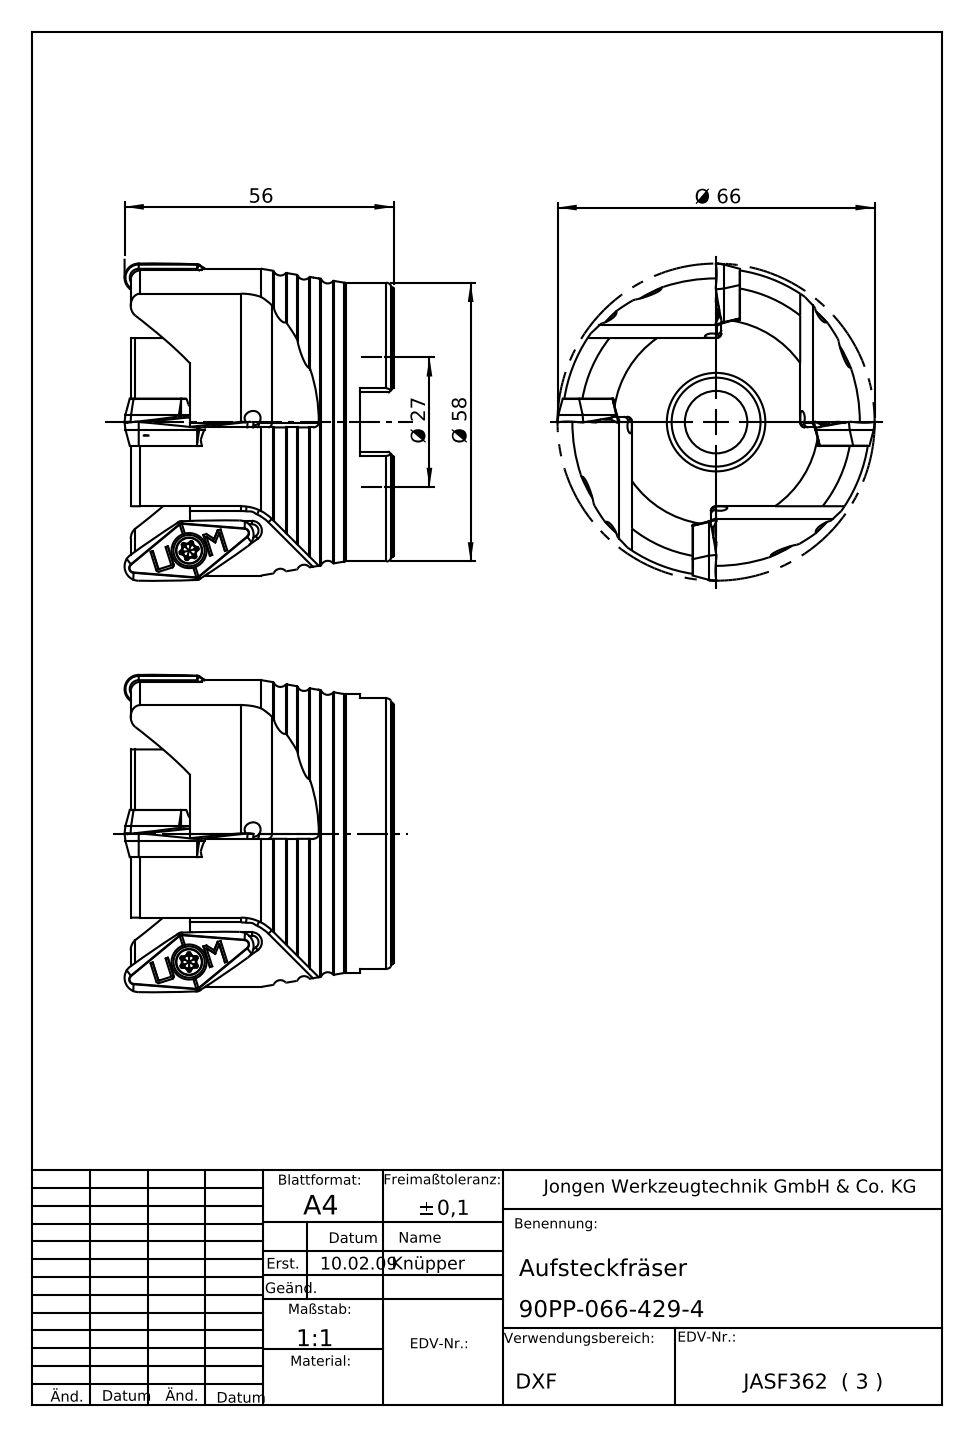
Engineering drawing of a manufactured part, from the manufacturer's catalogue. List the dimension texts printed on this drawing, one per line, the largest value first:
Ø 66
Ø 58
56
Ø 27
